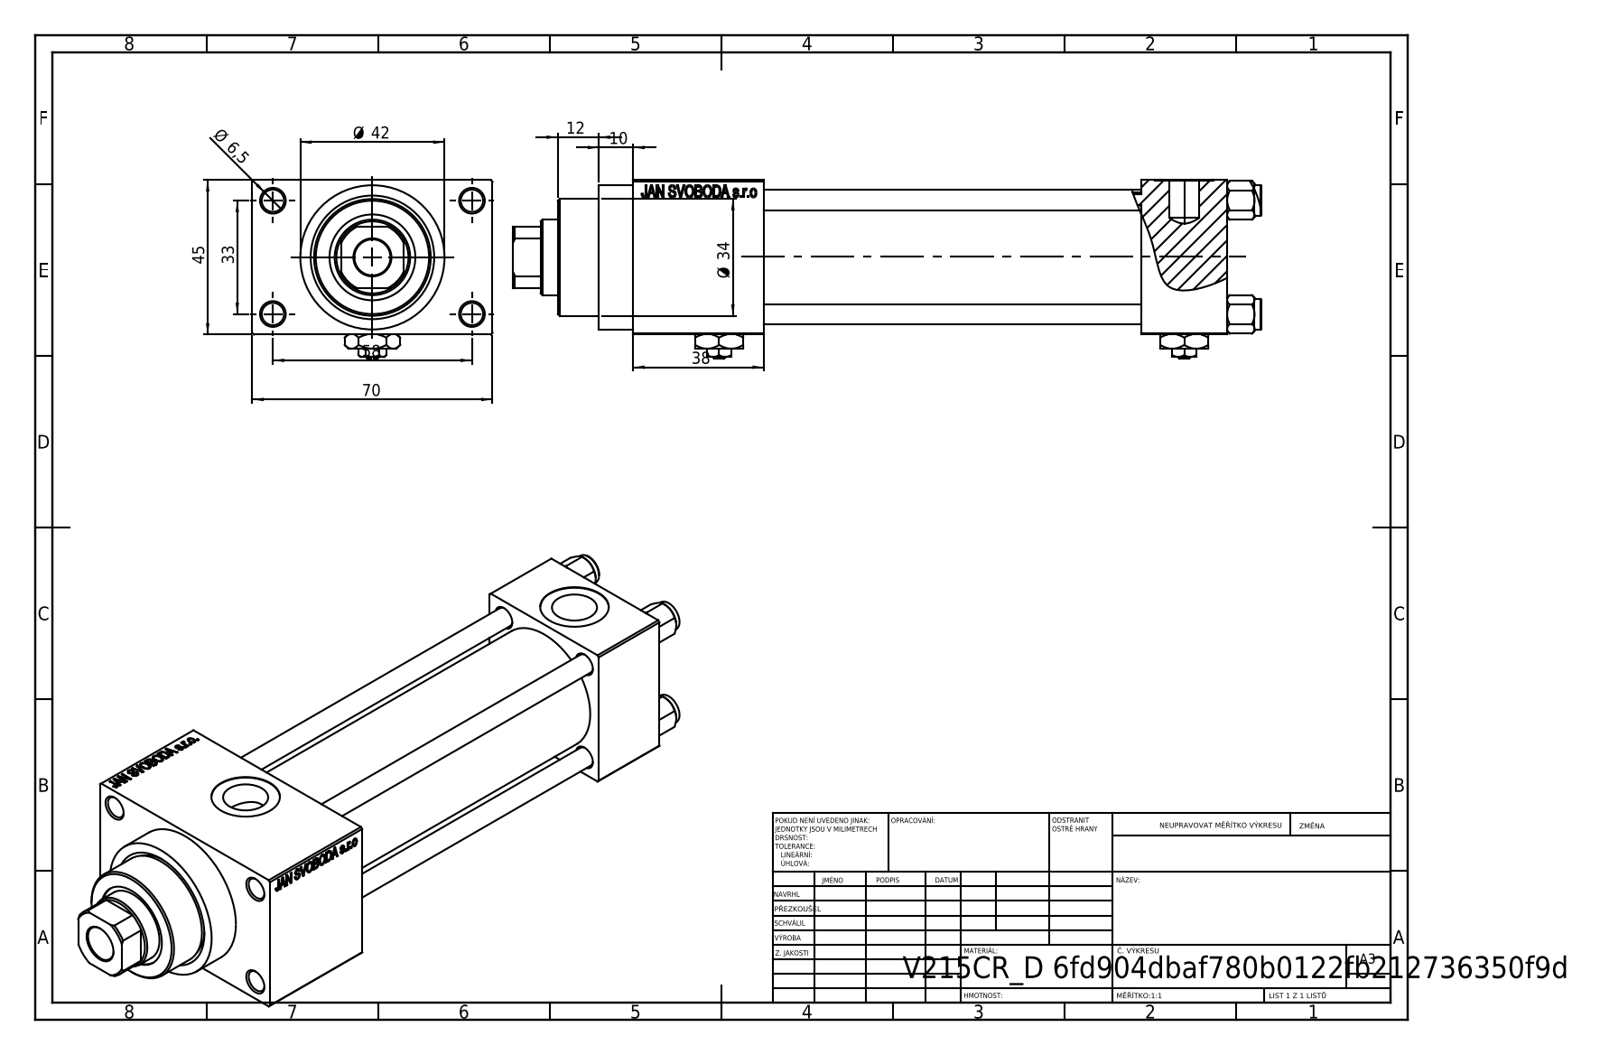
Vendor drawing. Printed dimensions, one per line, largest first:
70
58
45
Ø 42
38
Ø 34
33
12
10
Ø 6,5
